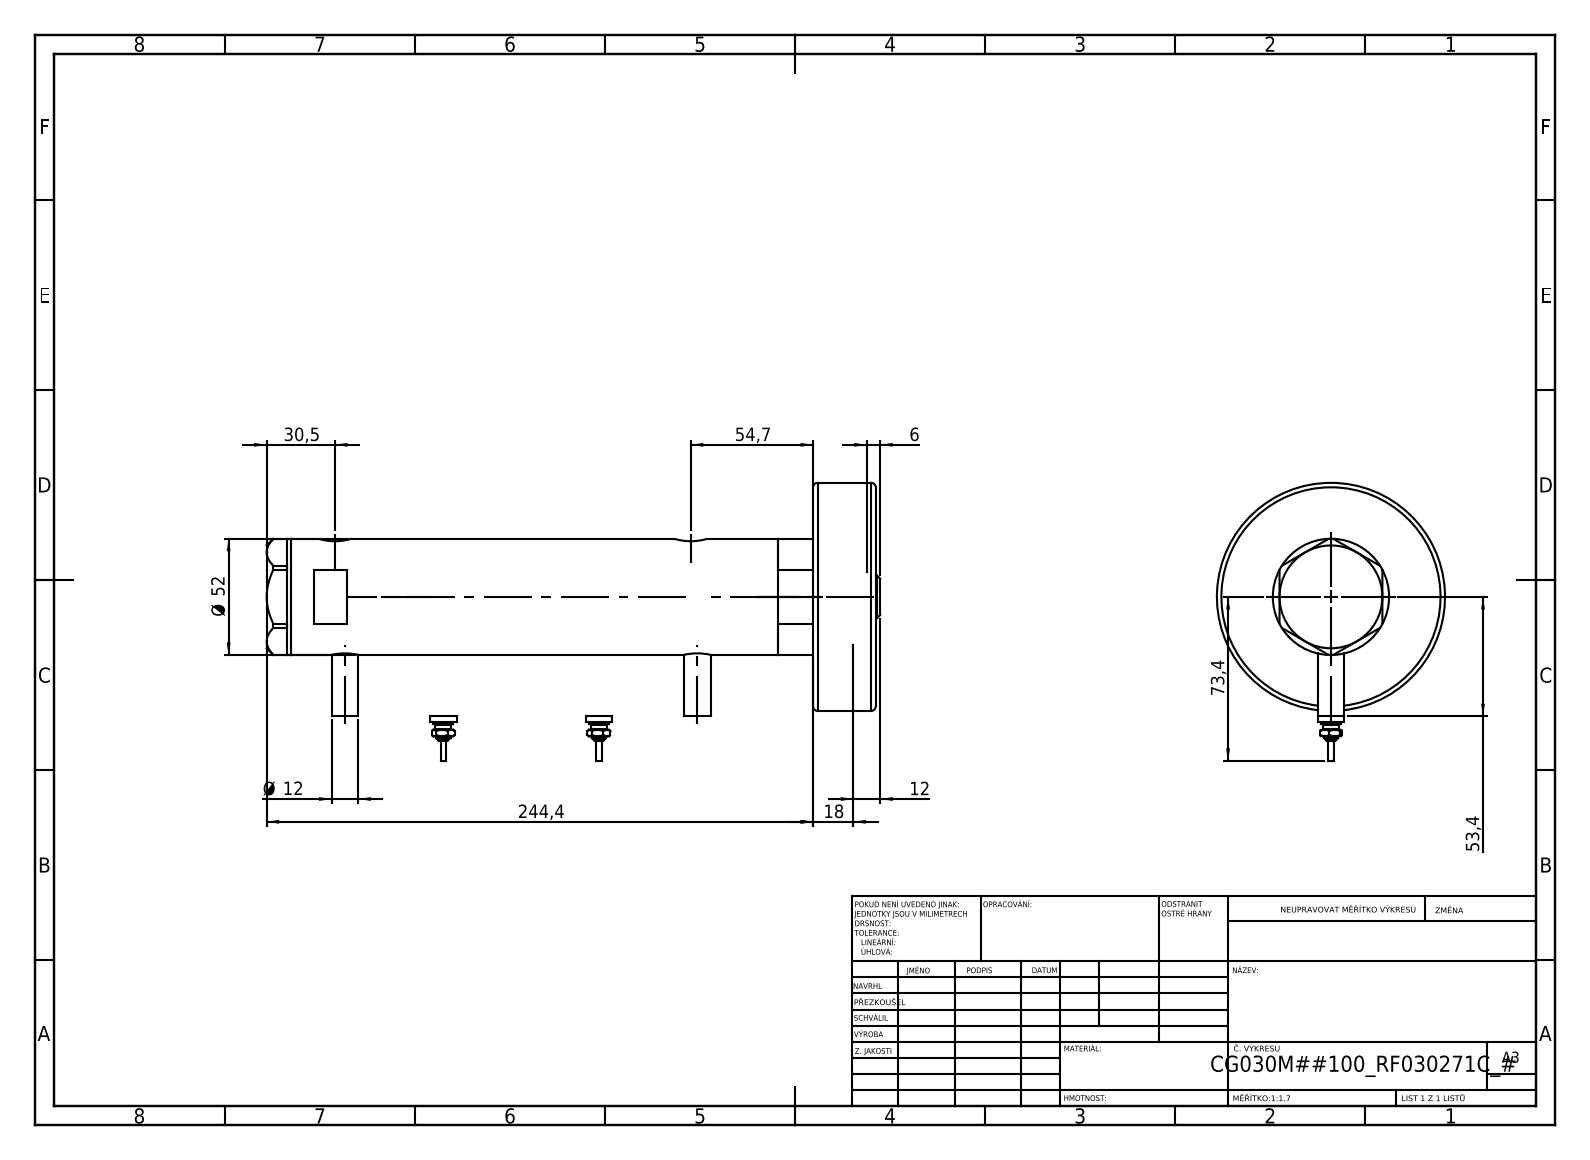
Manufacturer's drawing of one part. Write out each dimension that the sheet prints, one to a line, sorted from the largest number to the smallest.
244,4
73,4
54,7
53,4
Ø 52
30,5
18
12
Ø 12
6
